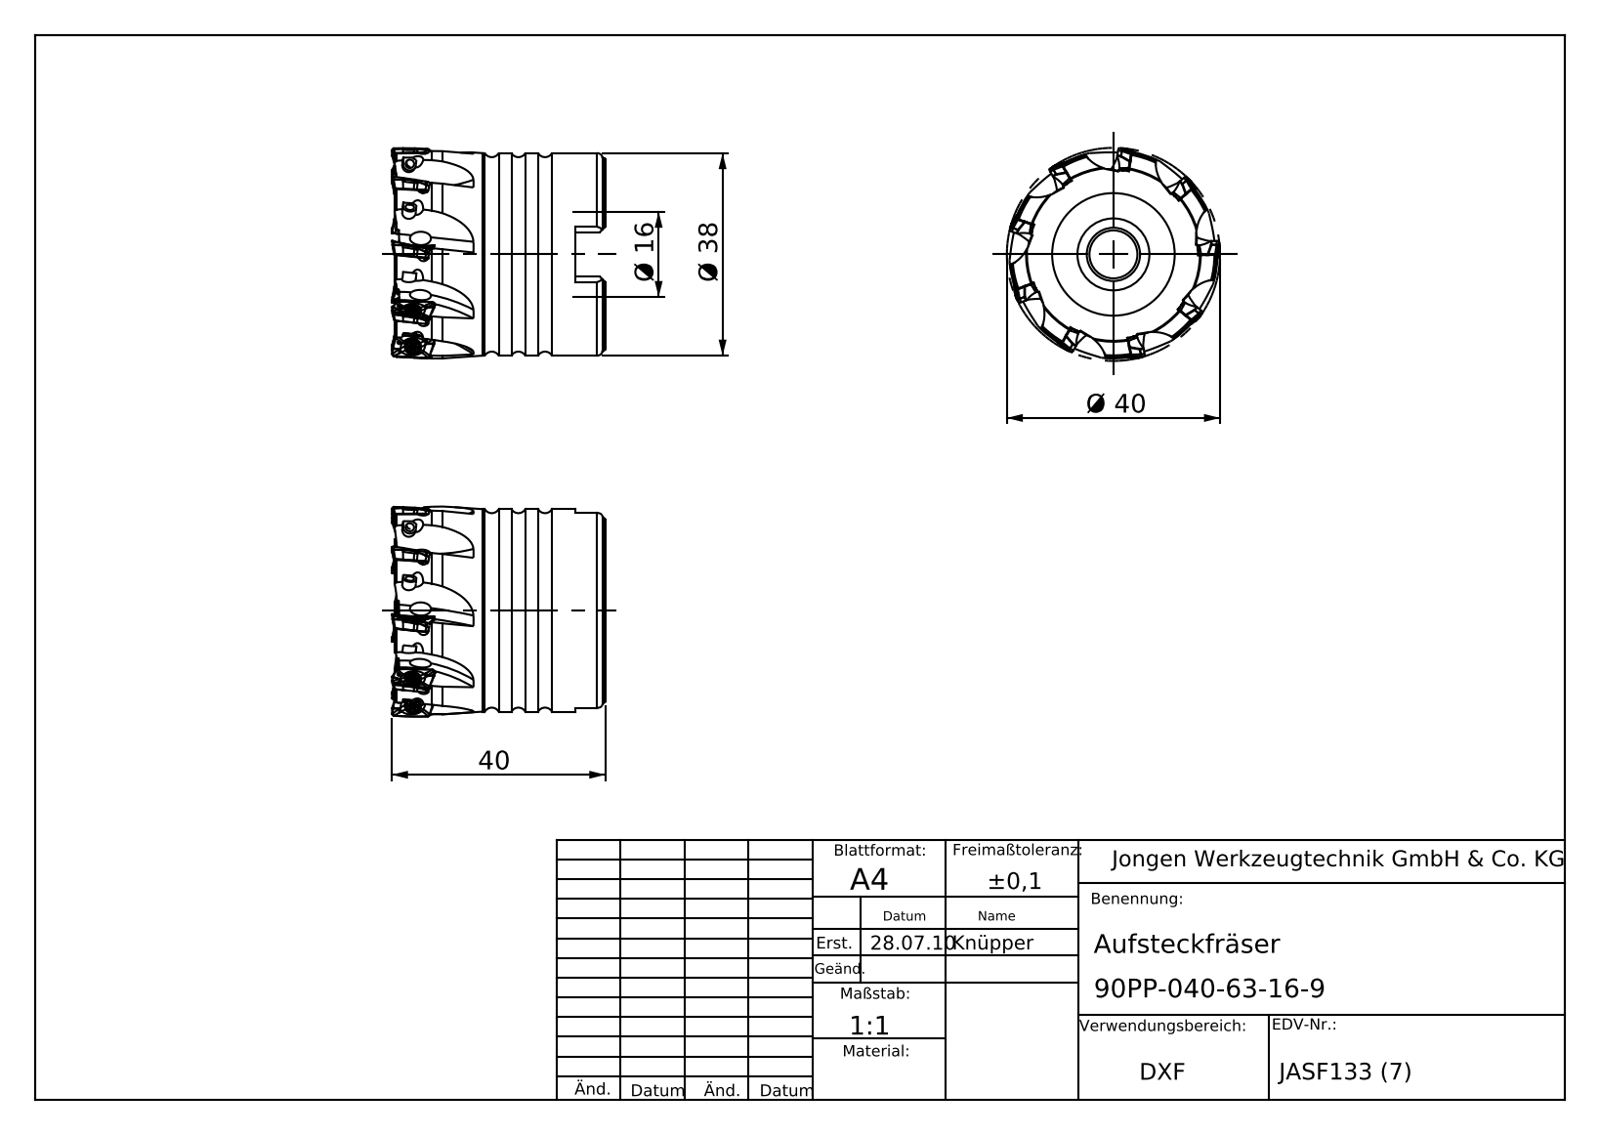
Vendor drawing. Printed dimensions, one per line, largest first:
Ø 40
40
Ø 38
Ø 16
